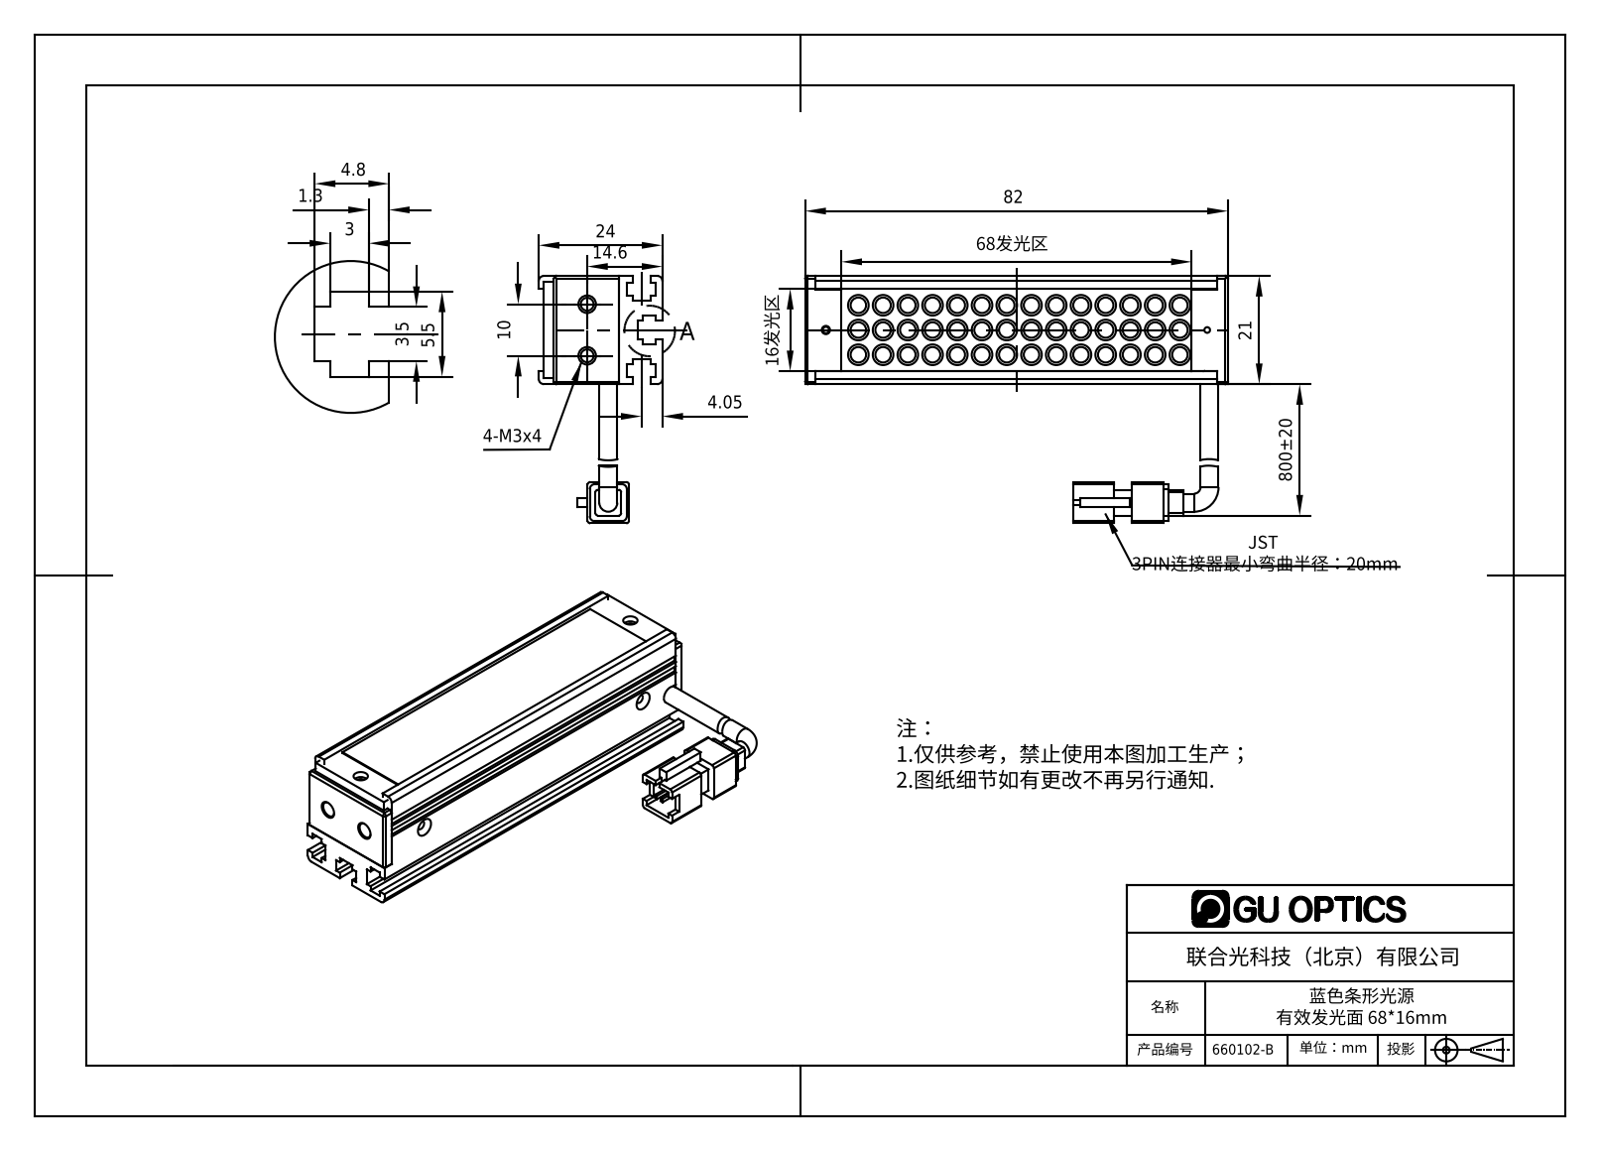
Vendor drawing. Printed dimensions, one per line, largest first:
800±20
82
68发光区
24
21
16发光区
14.6
10
5.5
4.8
4.05
3.5
3
1.3
